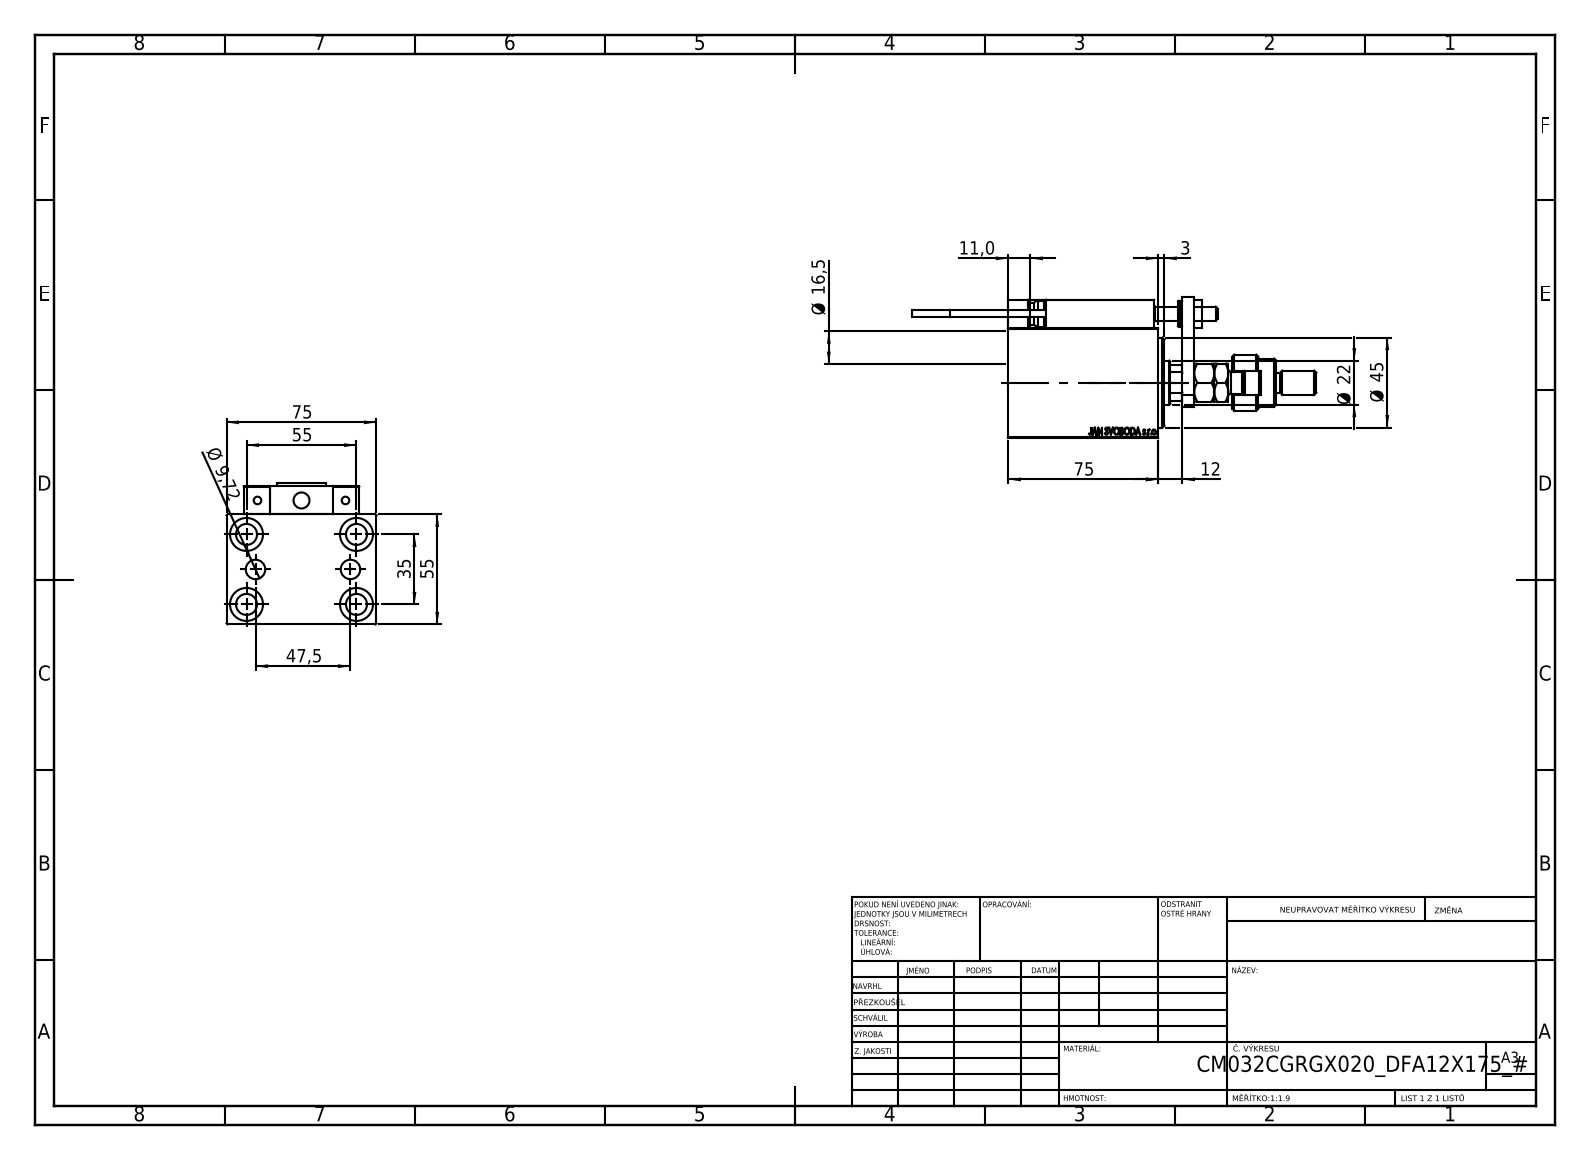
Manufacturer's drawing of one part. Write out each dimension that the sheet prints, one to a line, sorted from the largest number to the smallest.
75
75
55
55
47,5
Ø 45
35
Ø 22
Ø 16,5
12
11,0
Ø 9,72
3
